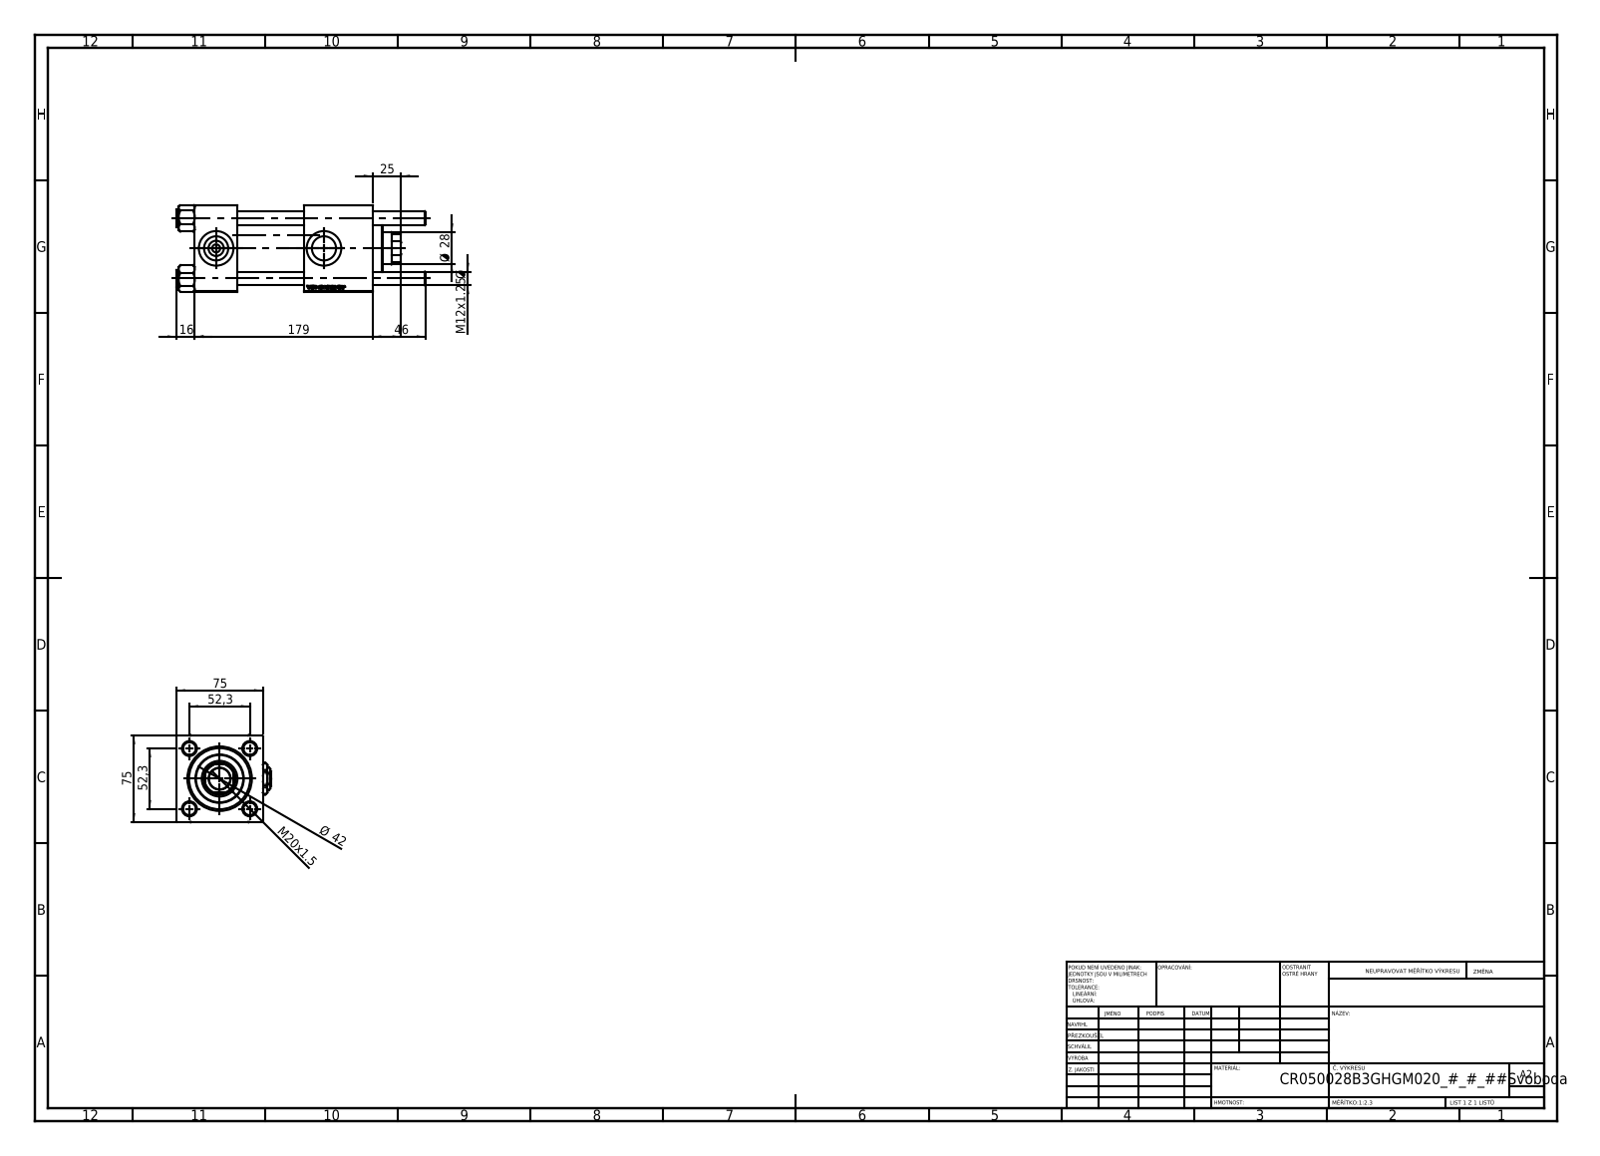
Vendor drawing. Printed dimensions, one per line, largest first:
179
75
75
52,3
52,3
46
Ø 42
Ø 28
25
M20x1.5
16
M12x1.25 Ø
